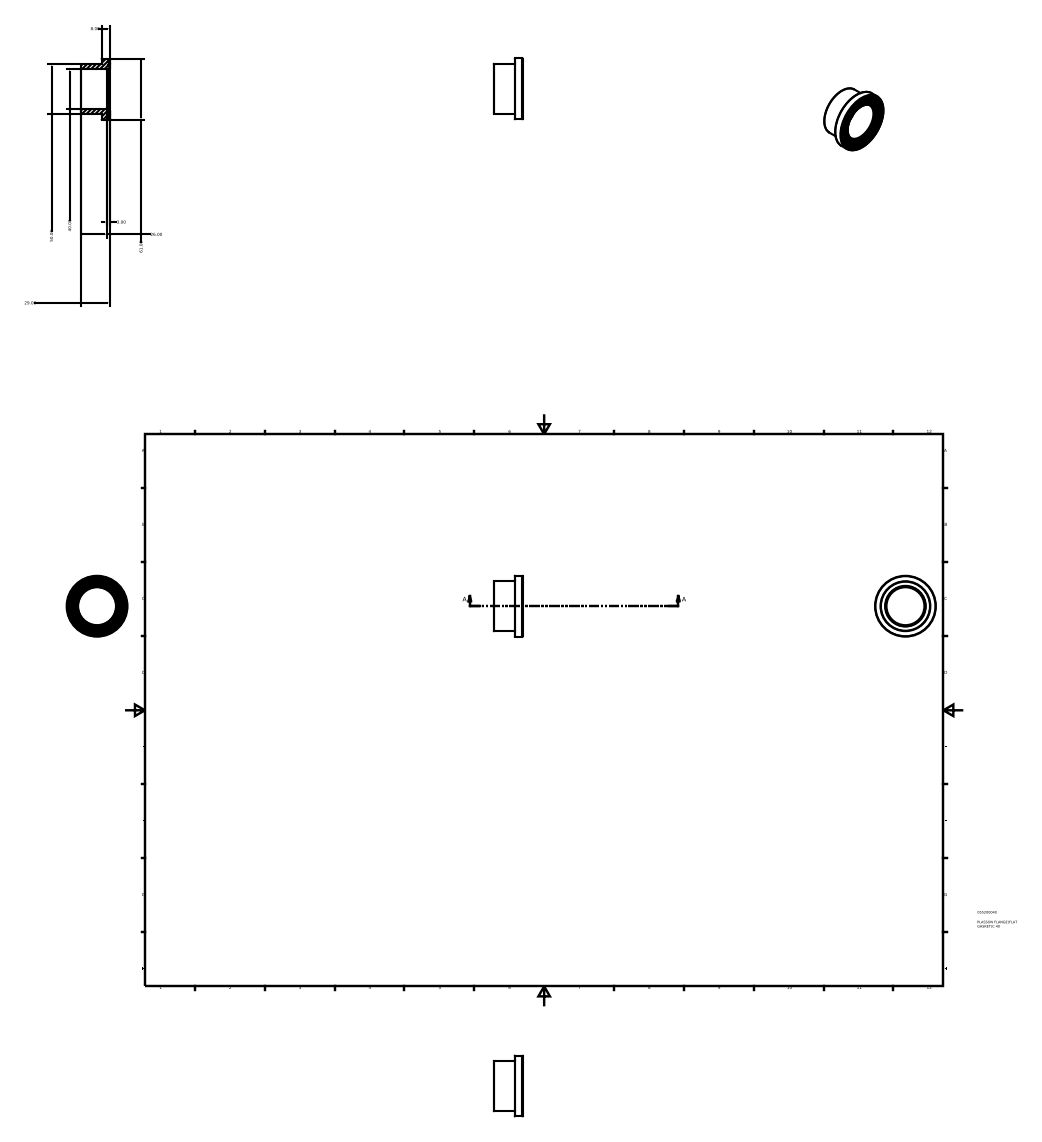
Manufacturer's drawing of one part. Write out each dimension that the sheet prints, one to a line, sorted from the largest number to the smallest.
61.00
50.00
40.00
29.00
26.00
8.00
3.00
